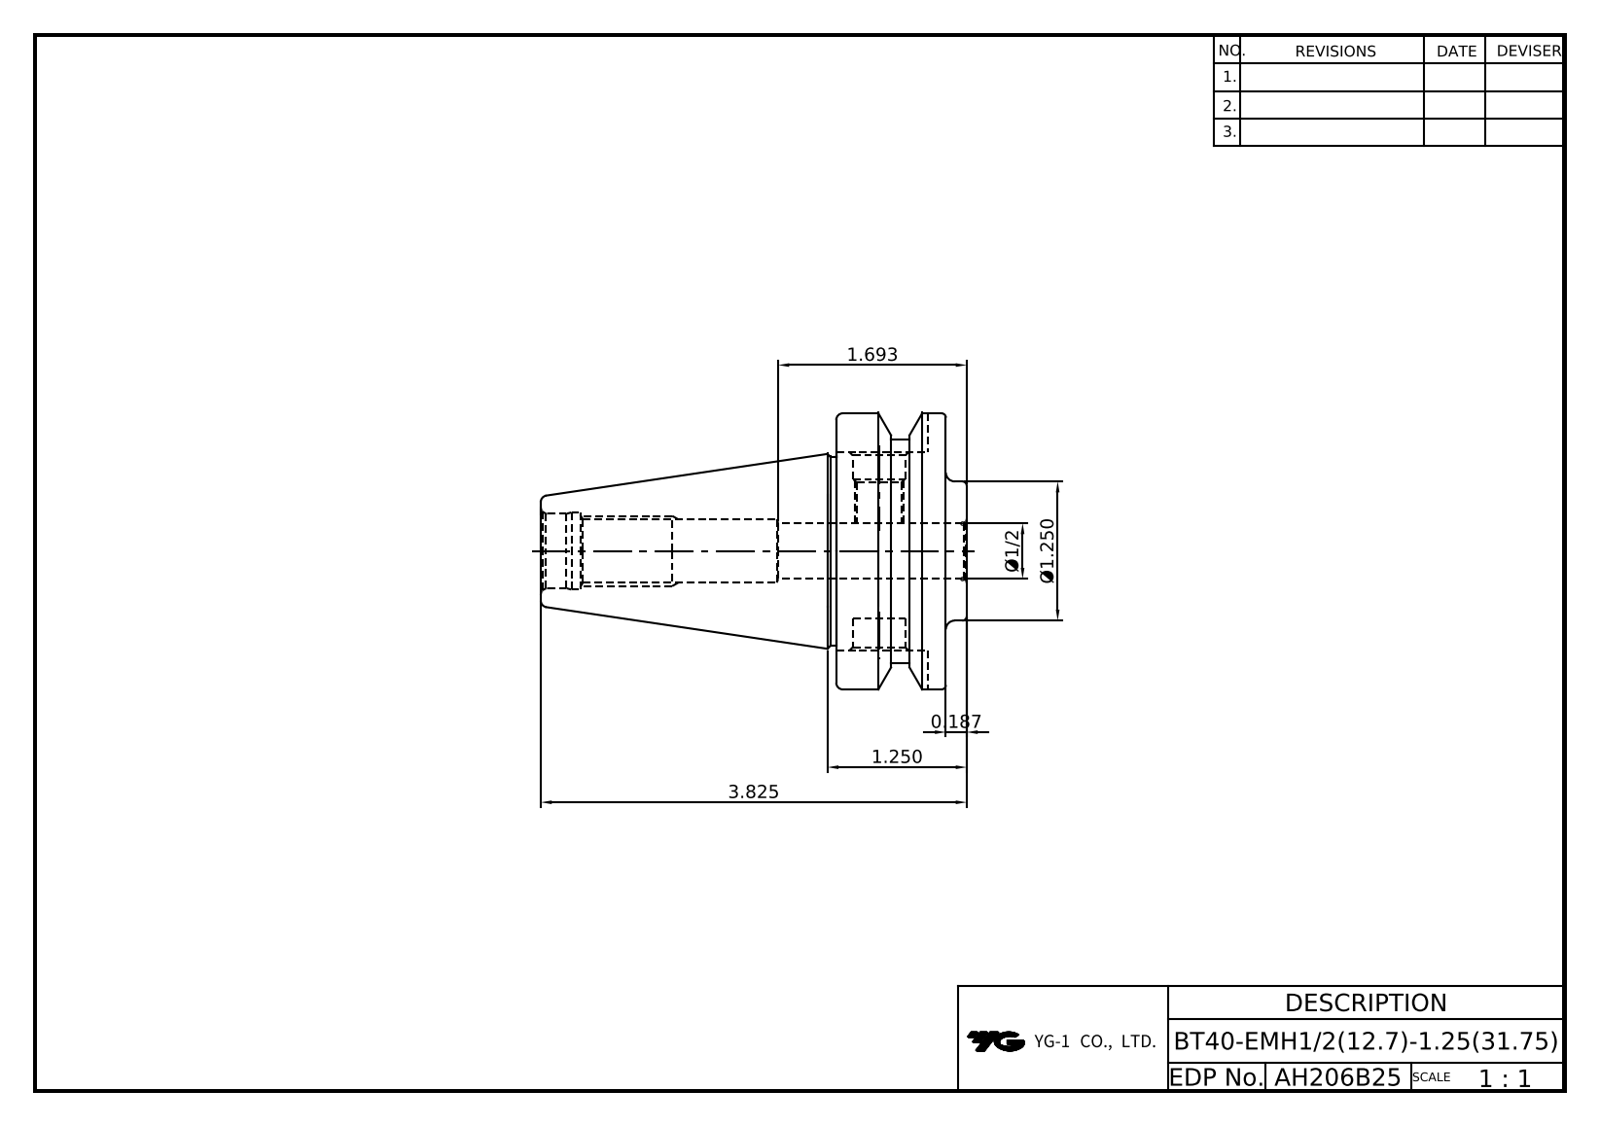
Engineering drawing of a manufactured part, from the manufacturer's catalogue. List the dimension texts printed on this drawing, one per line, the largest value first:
3.825
1.693
Ø1.250
1.250
Ø1/2
0.187
